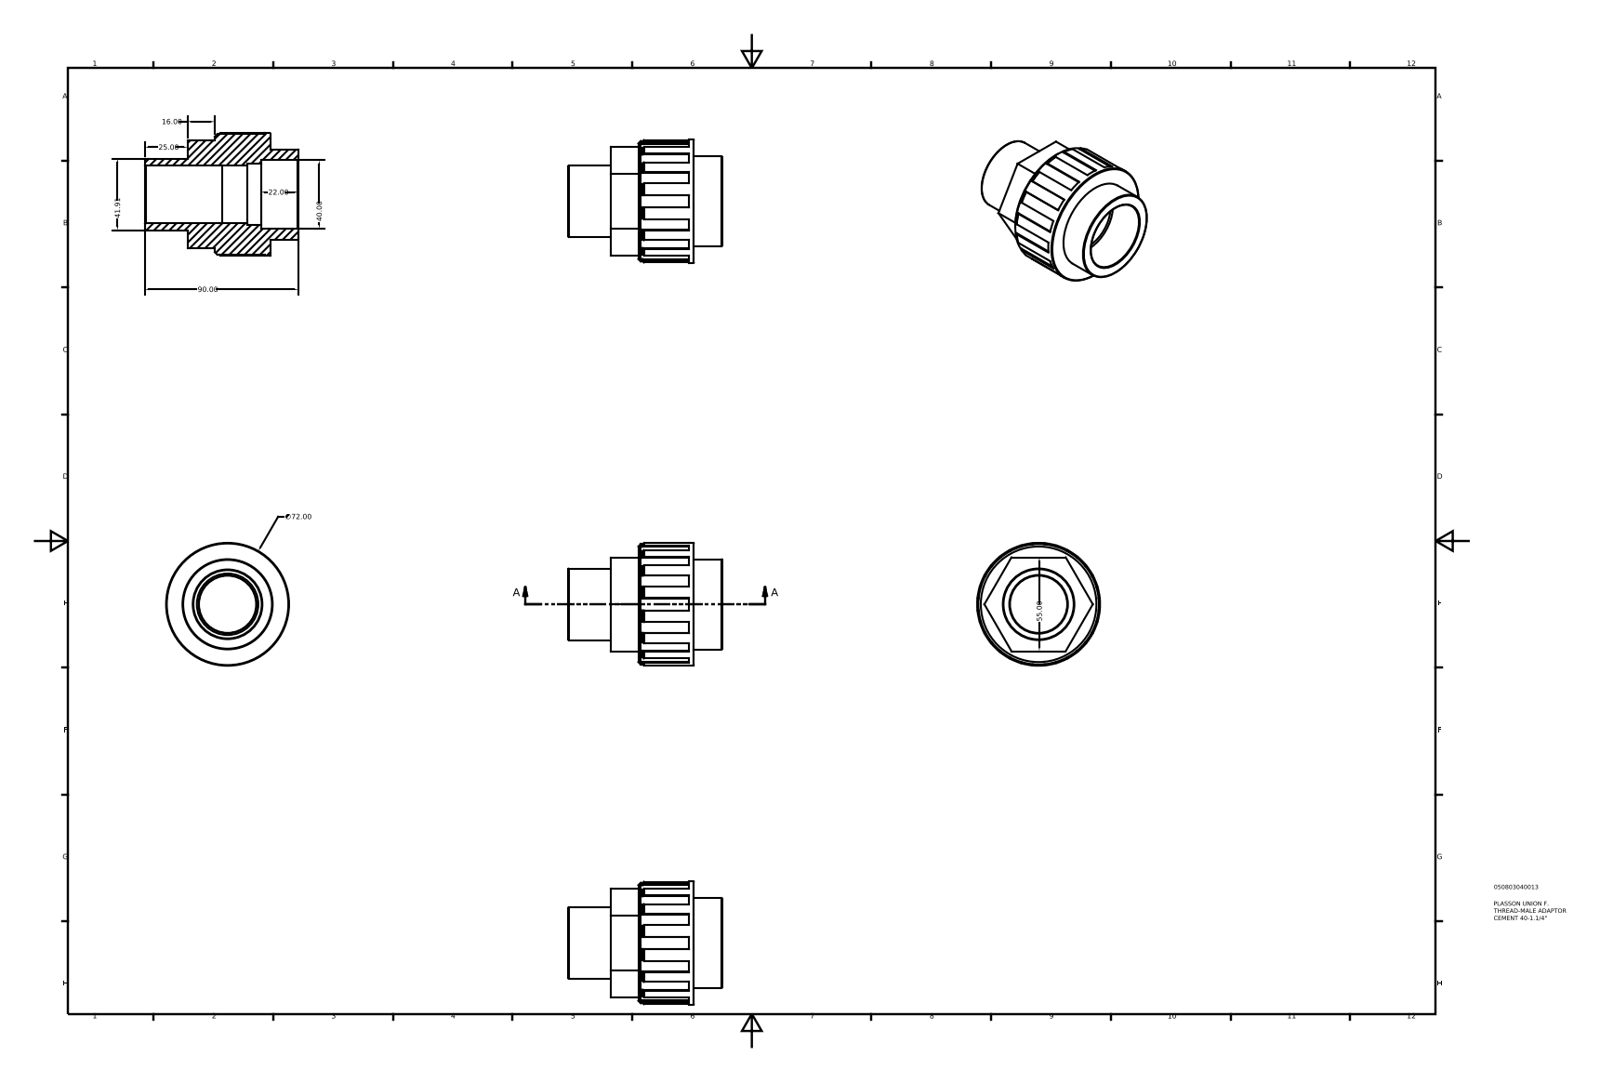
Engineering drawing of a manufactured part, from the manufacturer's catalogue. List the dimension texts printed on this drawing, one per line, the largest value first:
90.00
∅72.00
55.00
41.91
40.00
25.00
22.00
16.00
